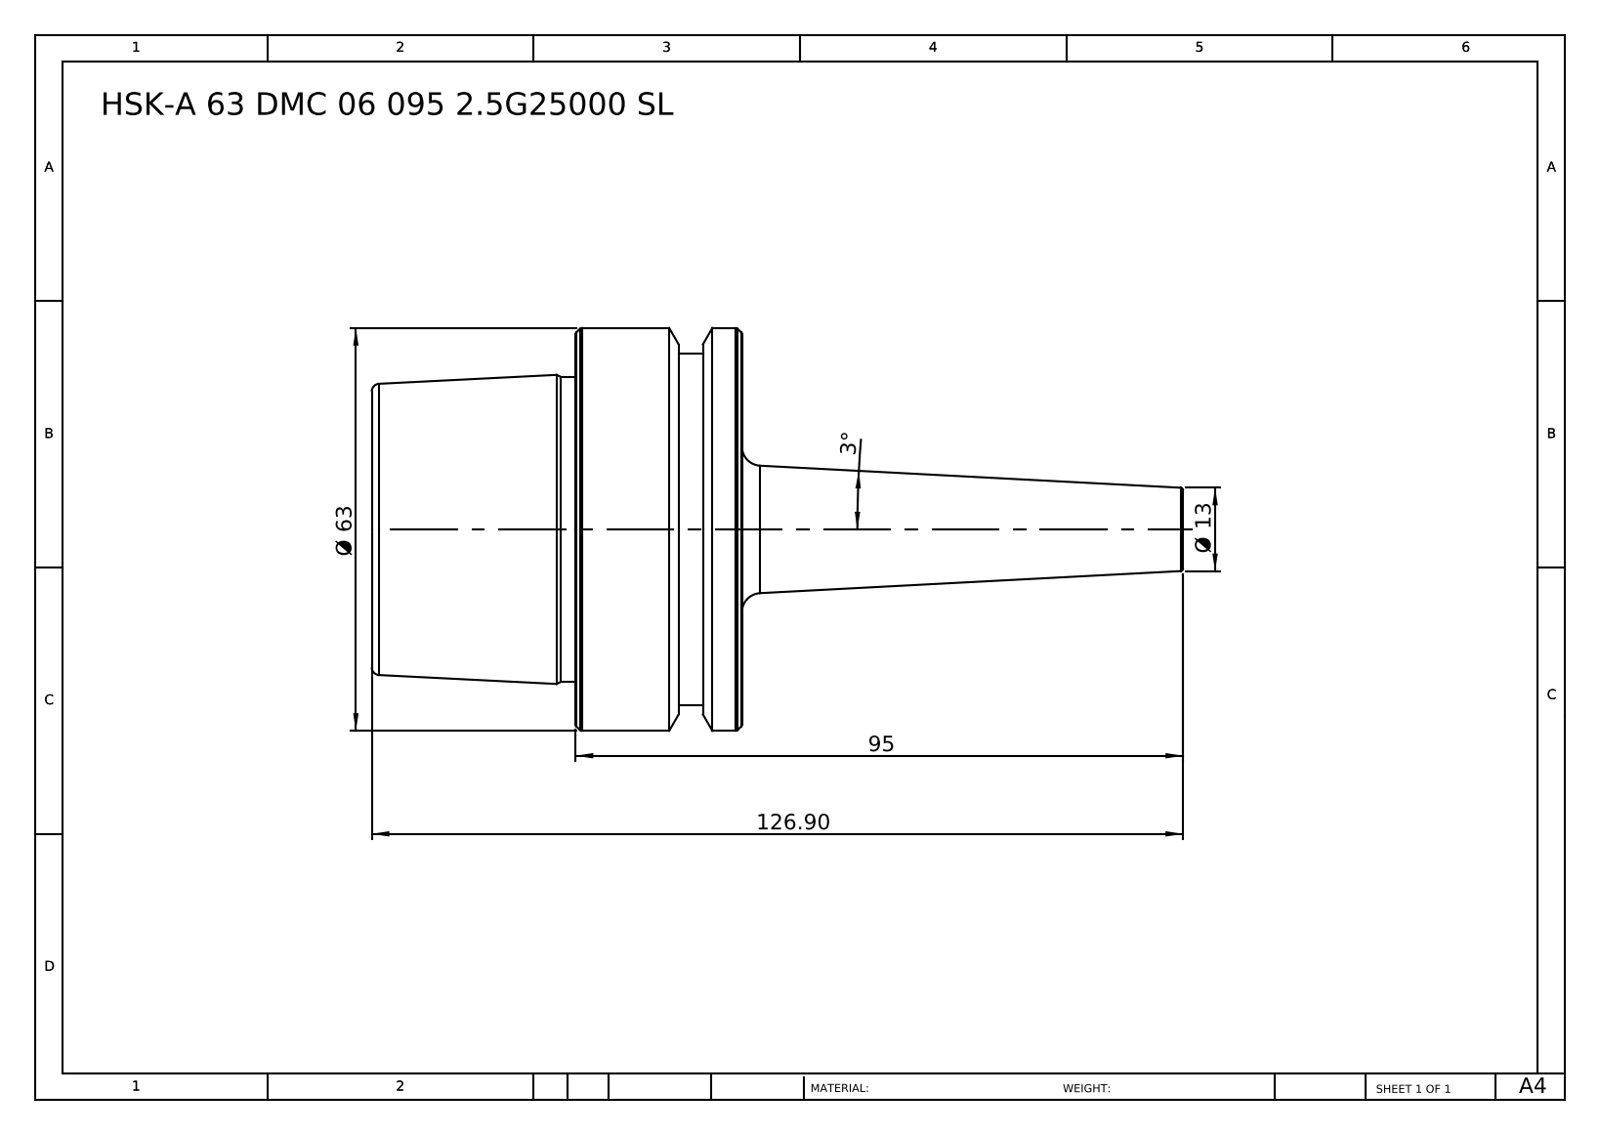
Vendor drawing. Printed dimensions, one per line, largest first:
126.90
95
Ø 63
Ø 13
3°
